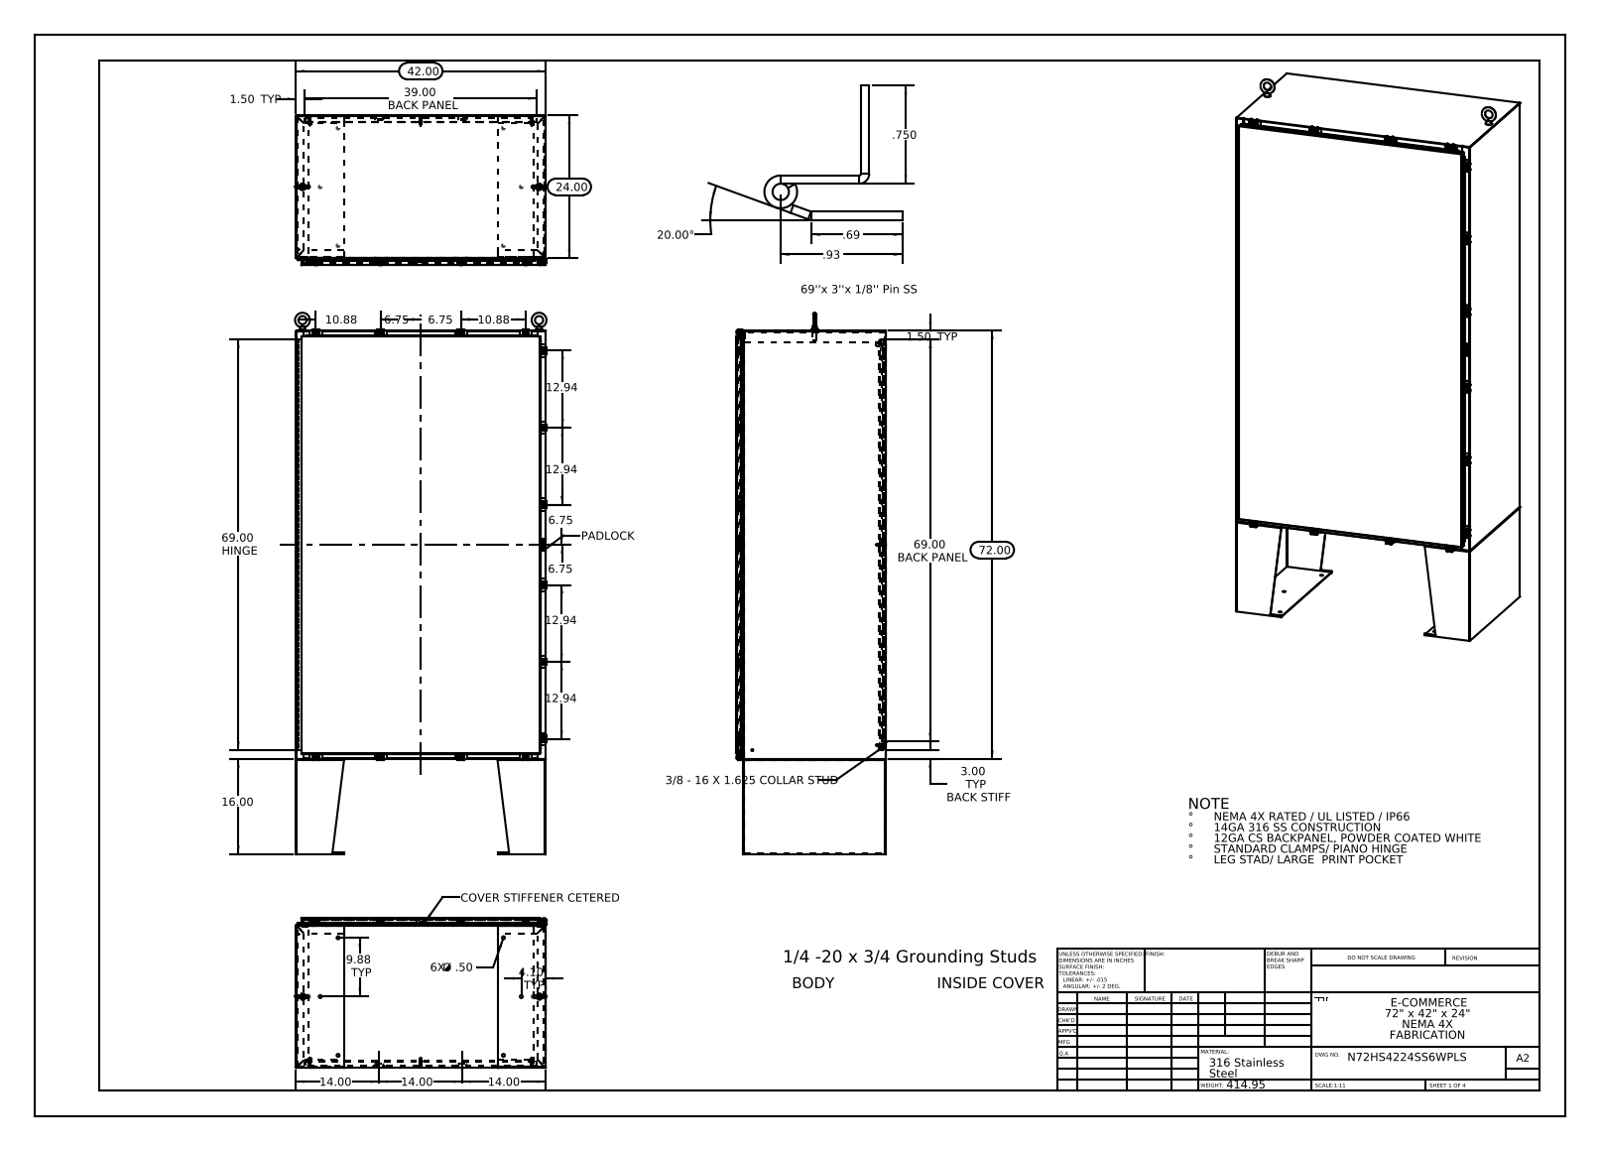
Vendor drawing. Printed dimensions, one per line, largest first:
72.00
69.00 HINGE
69.00 BACK PANEL
42.00
39.00 BACK PANEL
24.00
20.00°
16.00
14.00
14.00
14.00
12.94
12.94
12.94
12.94
10.88
10.88
9.88 TYP
6.75
6.75
6.75
6.75
4.10 TYP
3.00 TYP BACK STIFF
1.50 TYP
1.50 TYP
.93
.750
.69
6X Ø .50
